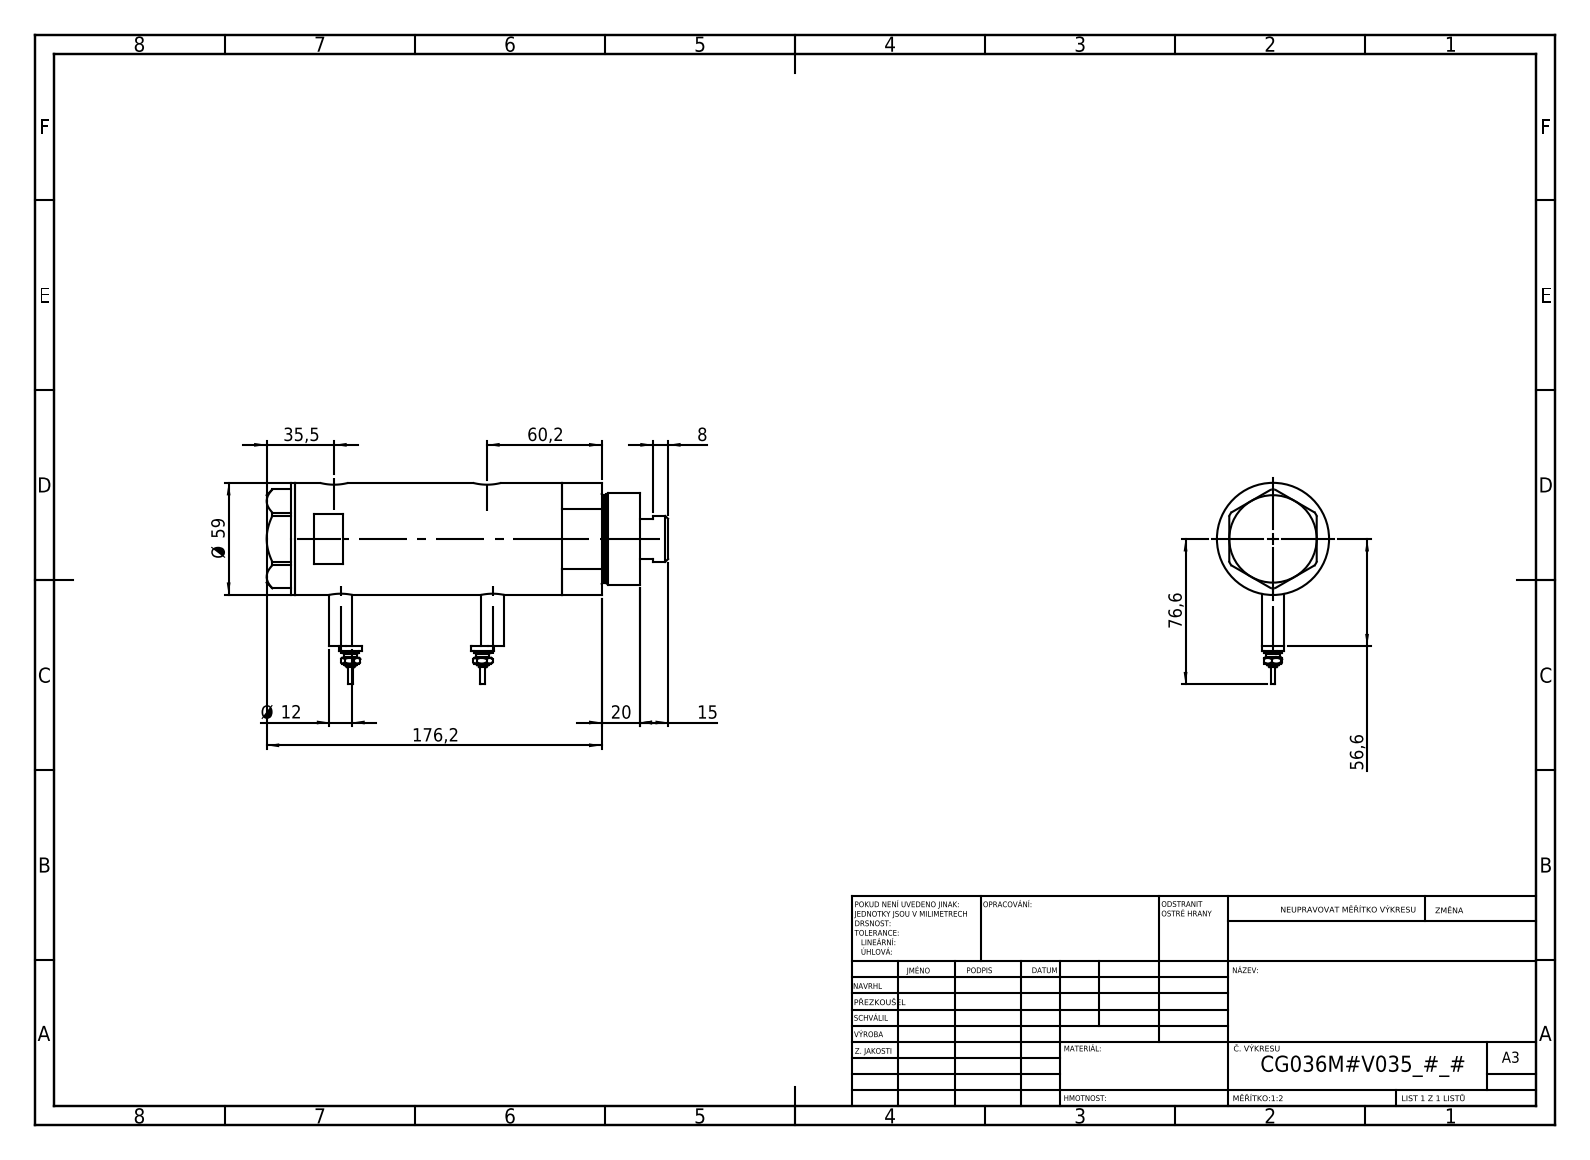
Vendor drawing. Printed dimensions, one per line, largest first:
176,2
76,6
60,2
Ø 59
56,6
35,5
20
15
Ø 12
8
